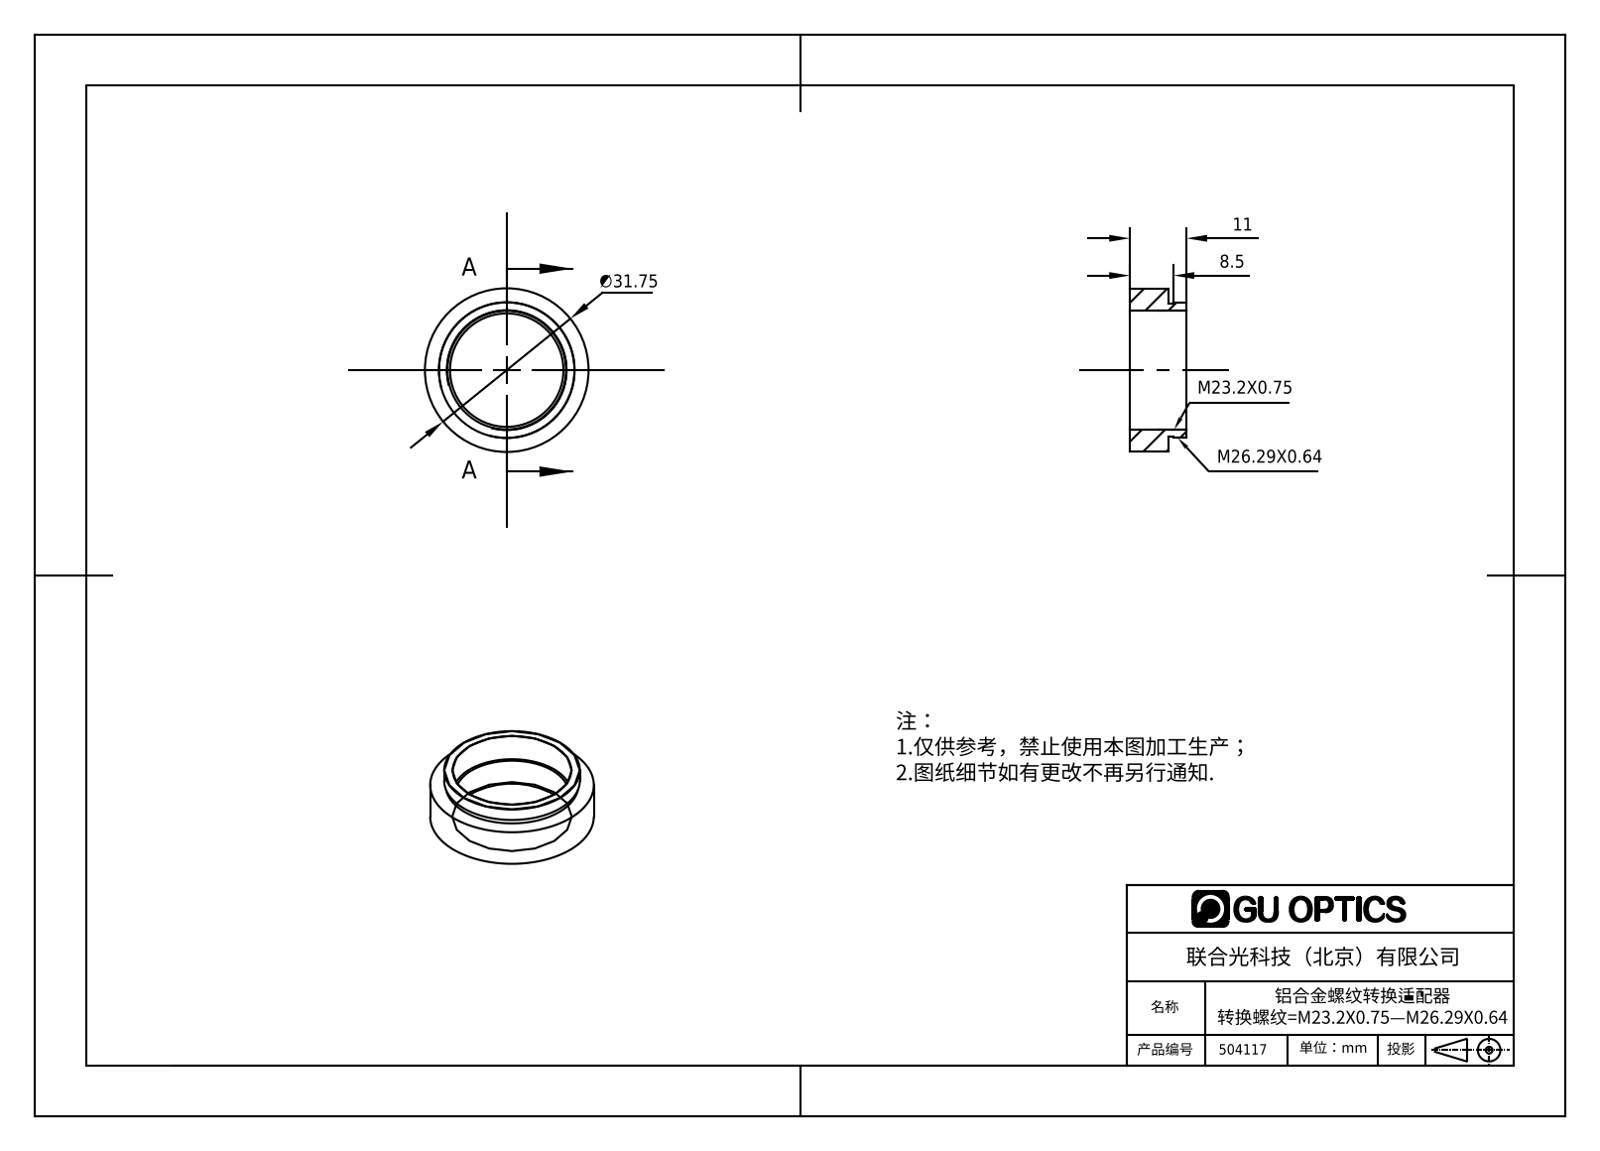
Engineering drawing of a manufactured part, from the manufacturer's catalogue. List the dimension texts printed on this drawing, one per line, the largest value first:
∅31.75
11
8.5
